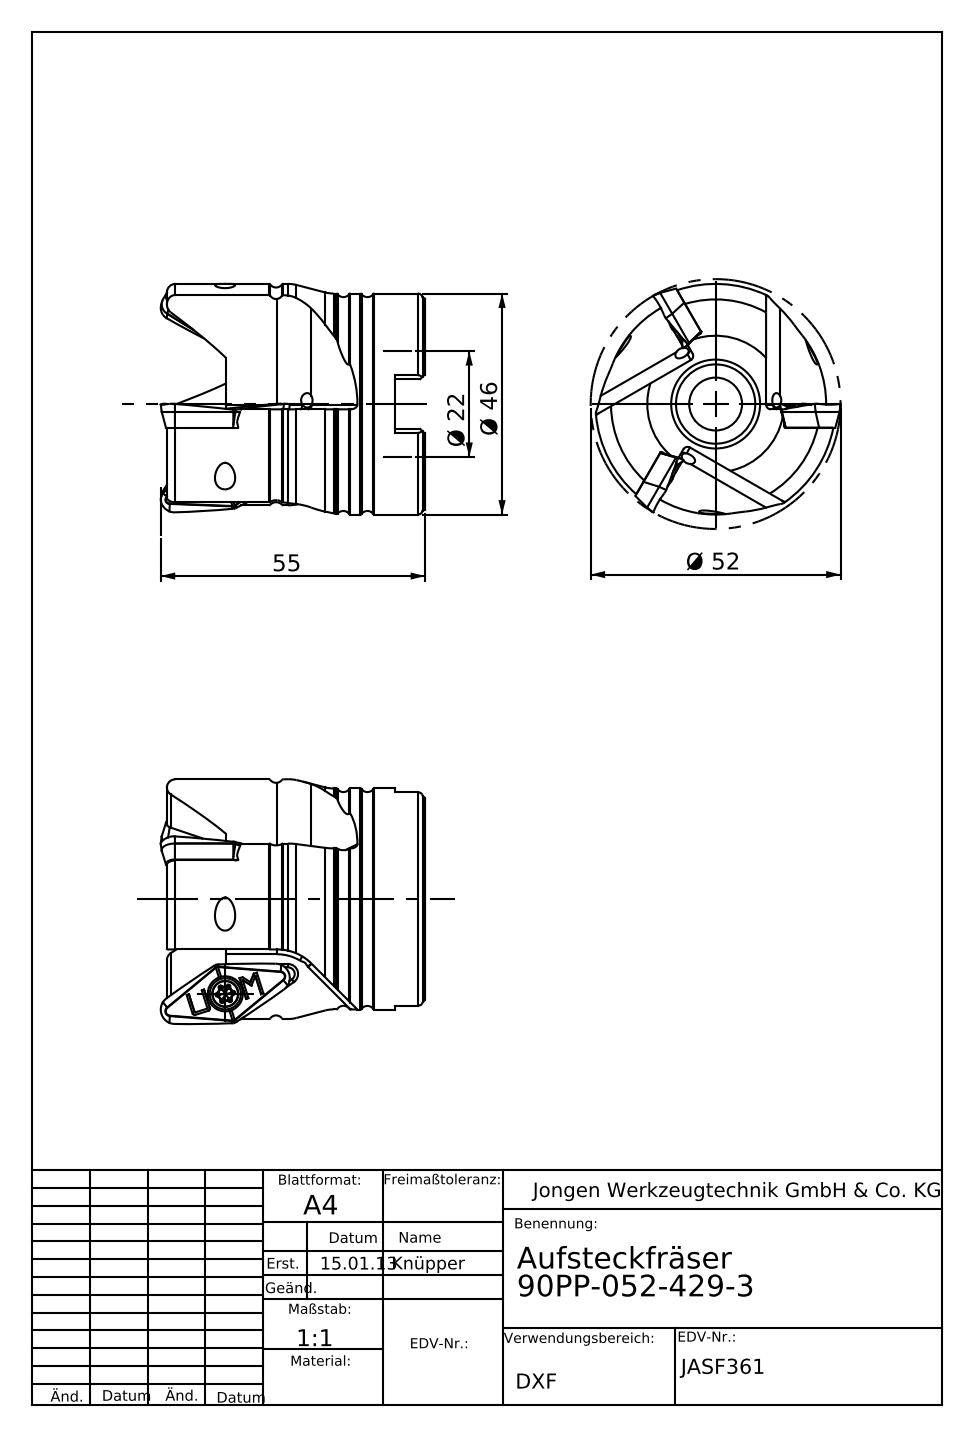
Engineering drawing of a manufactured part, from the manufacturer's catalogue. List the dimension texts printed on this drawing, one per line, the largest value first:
55
Ø 52
Ø 46
Ø 22
